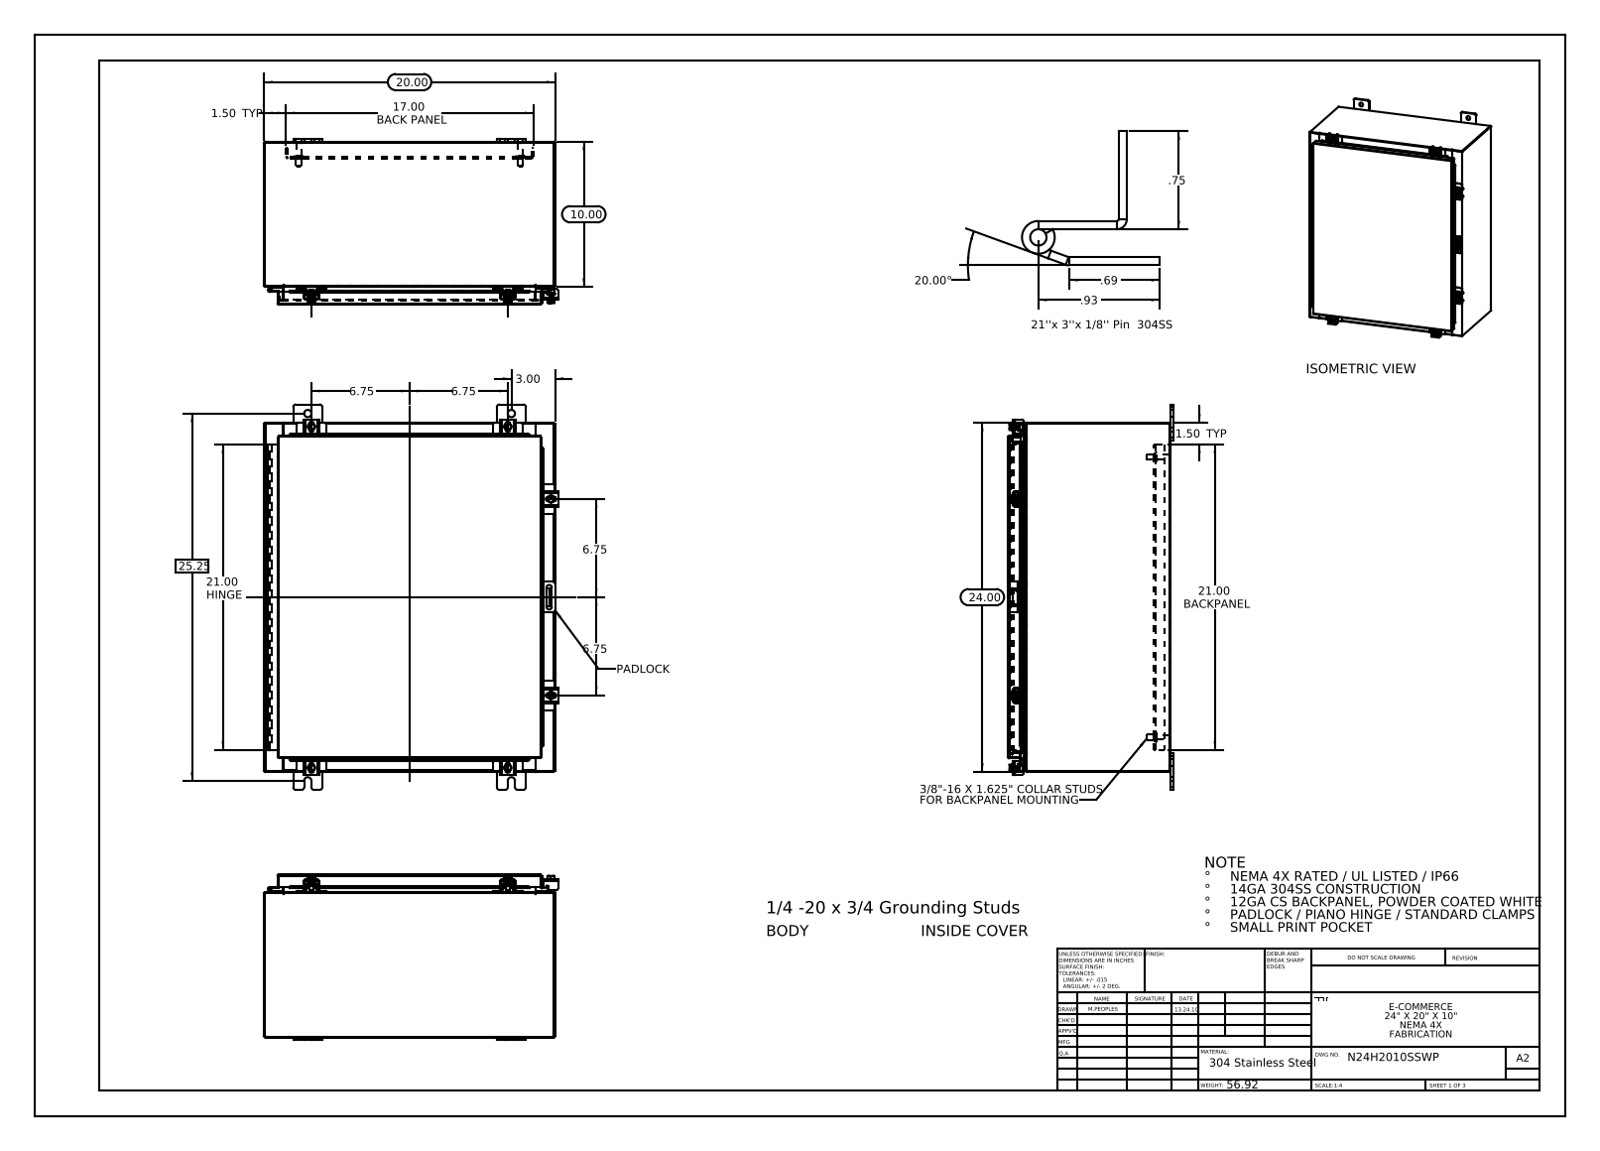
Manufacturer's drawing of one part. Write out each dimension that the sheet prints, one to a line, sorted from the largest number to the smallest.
25.25
24.00
21.00 HINGE
21.00 BACKPANEL
20.00
20.00°
17.00 BACK PANEL
10.00
6.75
6.75
6.75
6.75
3.00
1.50 TYP
1.50 TYP
.93
.75
.69
